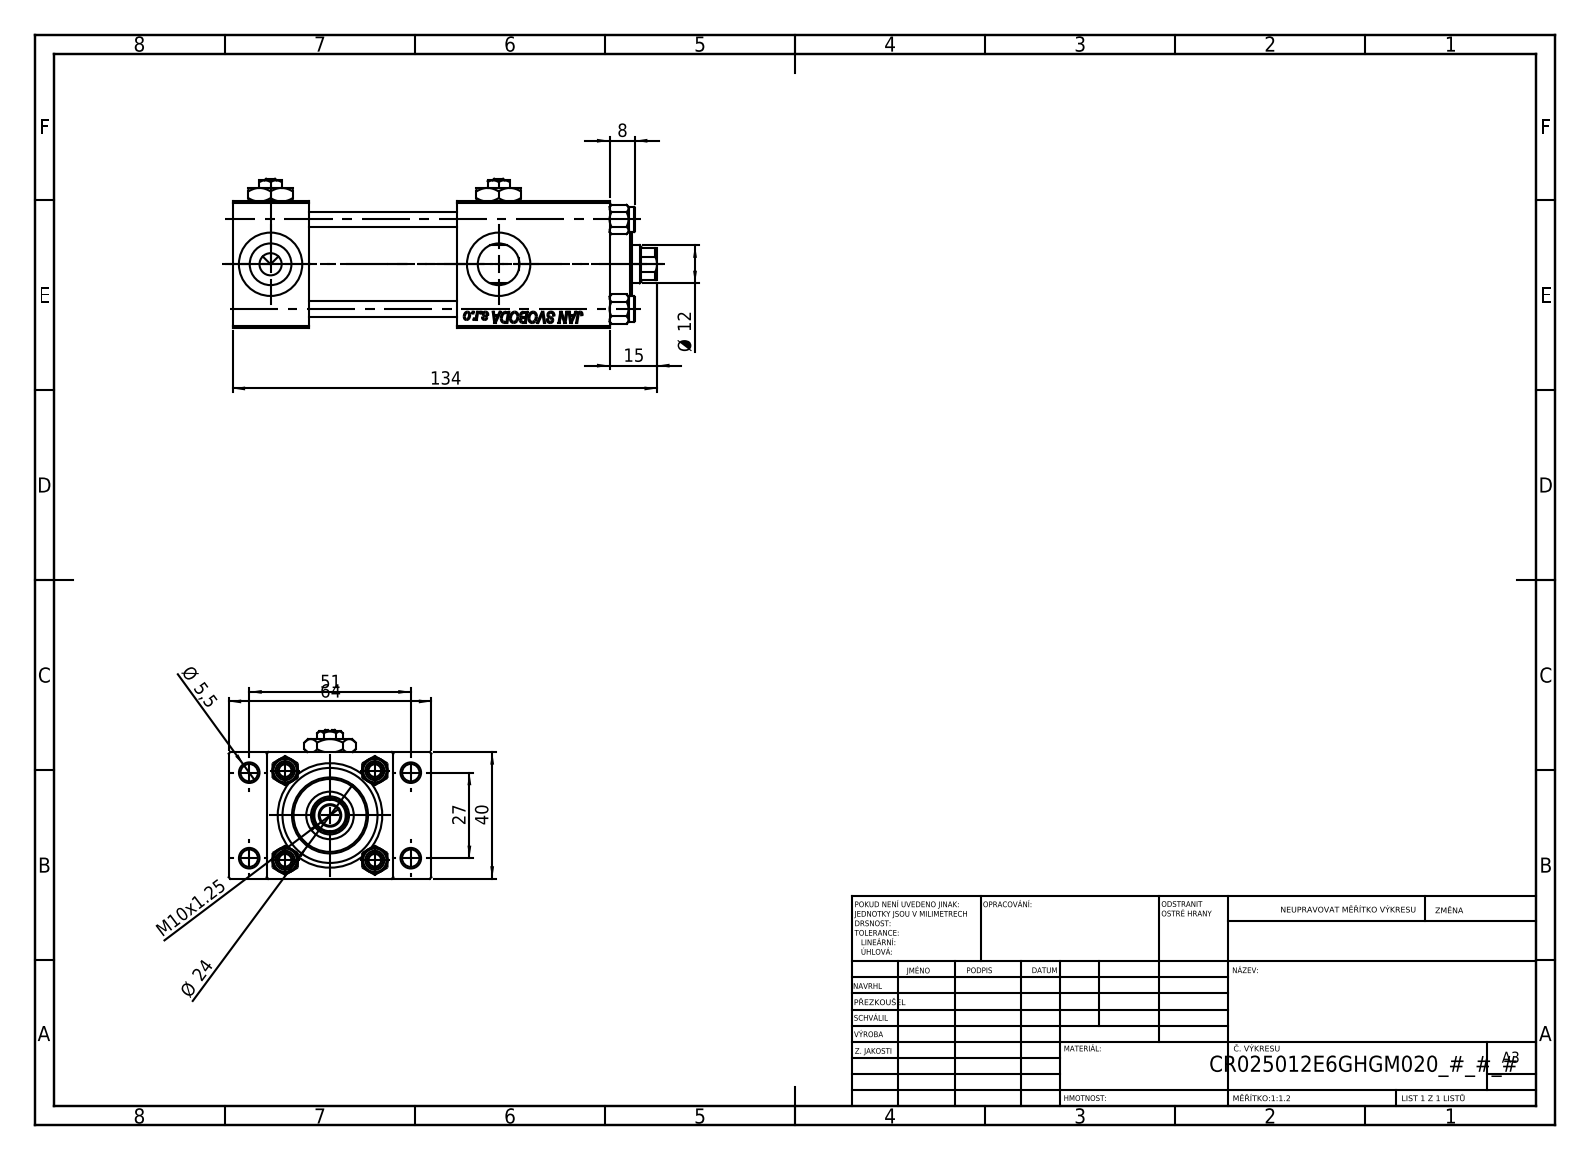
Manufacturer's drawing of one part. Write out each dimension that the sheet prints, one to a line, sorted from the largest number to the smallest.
134
64
51
40
27
Ø 24
15
Ø 12
M10x1.25
8
Ø 5,5
